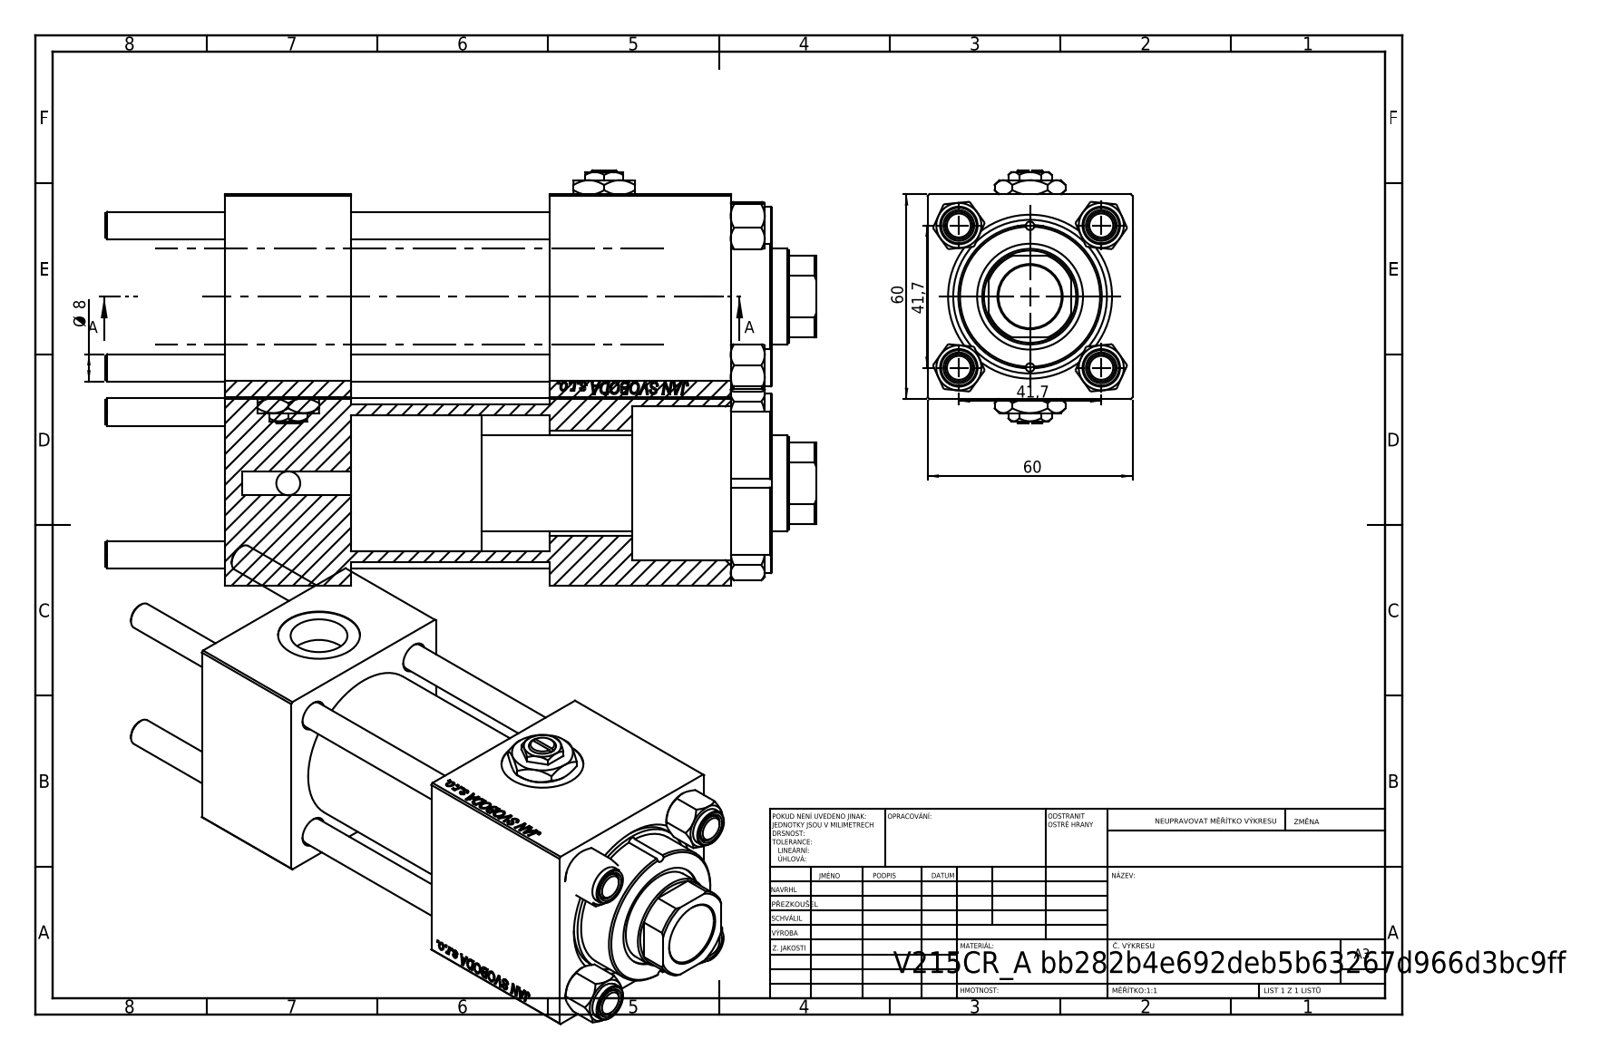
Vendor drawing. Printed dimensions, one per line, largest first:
60
60
41,7
41,7
Ø 8
